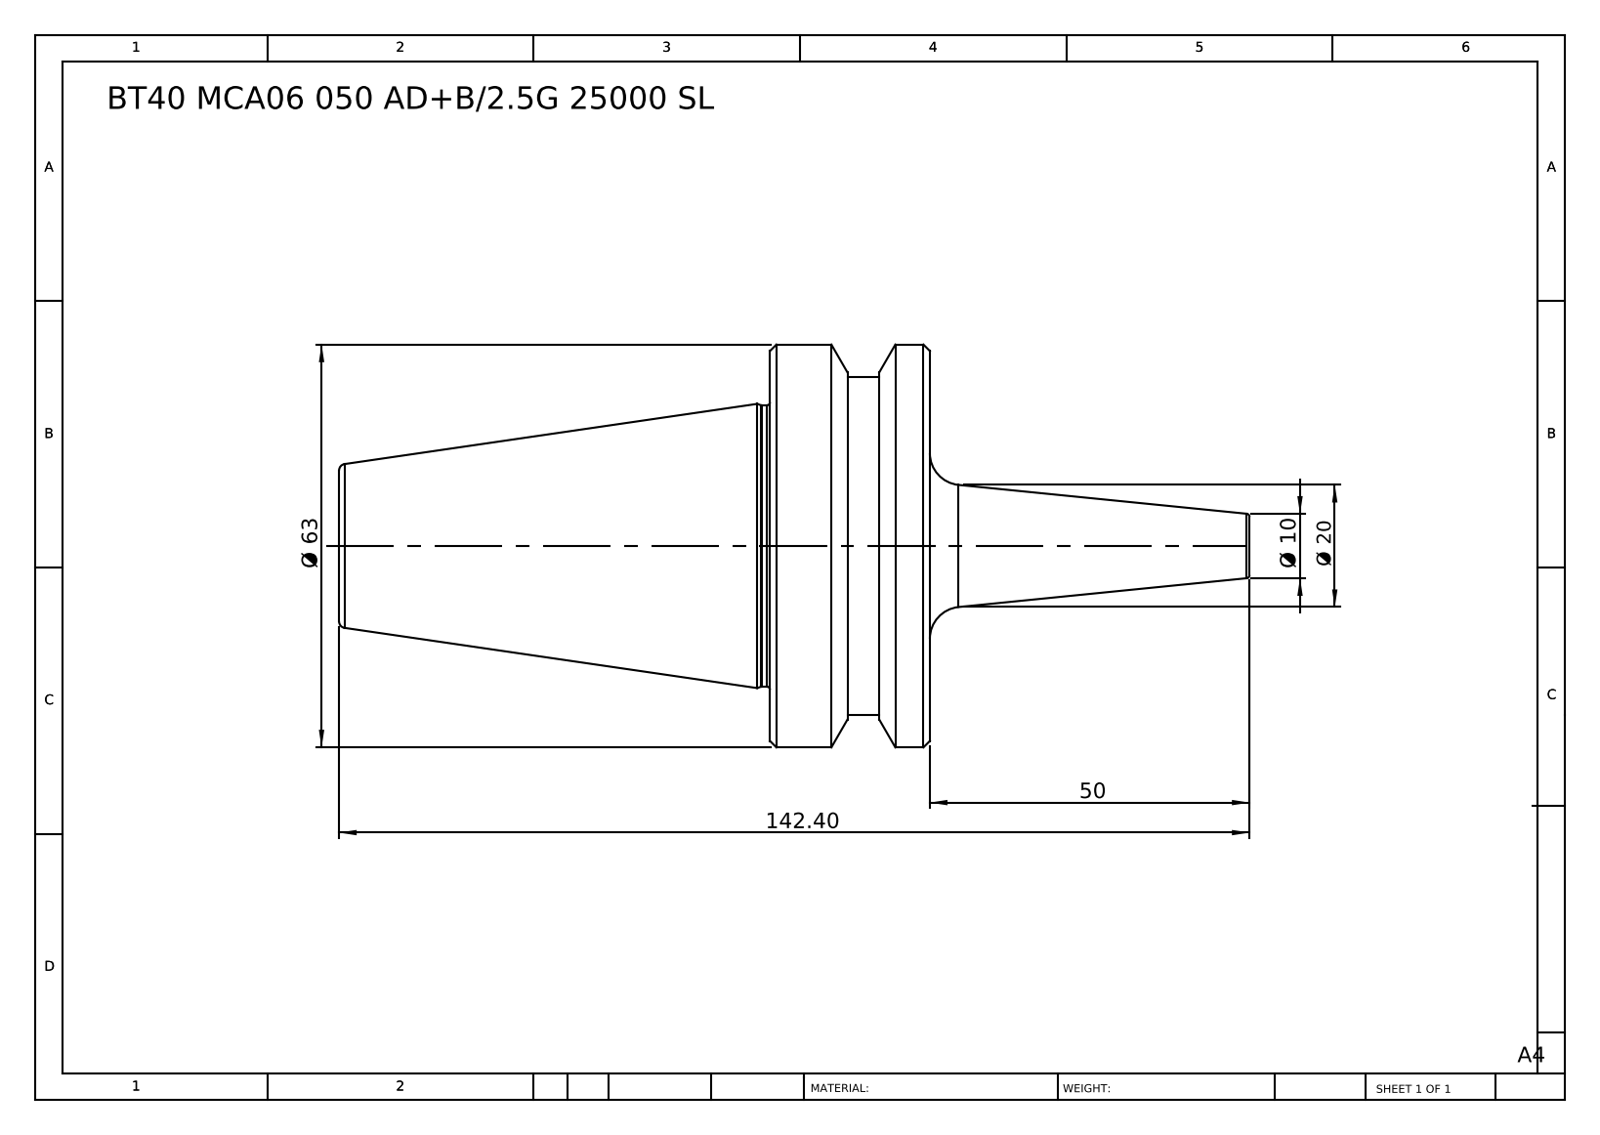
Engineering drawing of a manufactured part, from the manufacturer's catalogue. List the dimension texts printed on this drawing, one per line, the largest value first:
142.40
Ø 63
50
Ø 20
Ø 10
